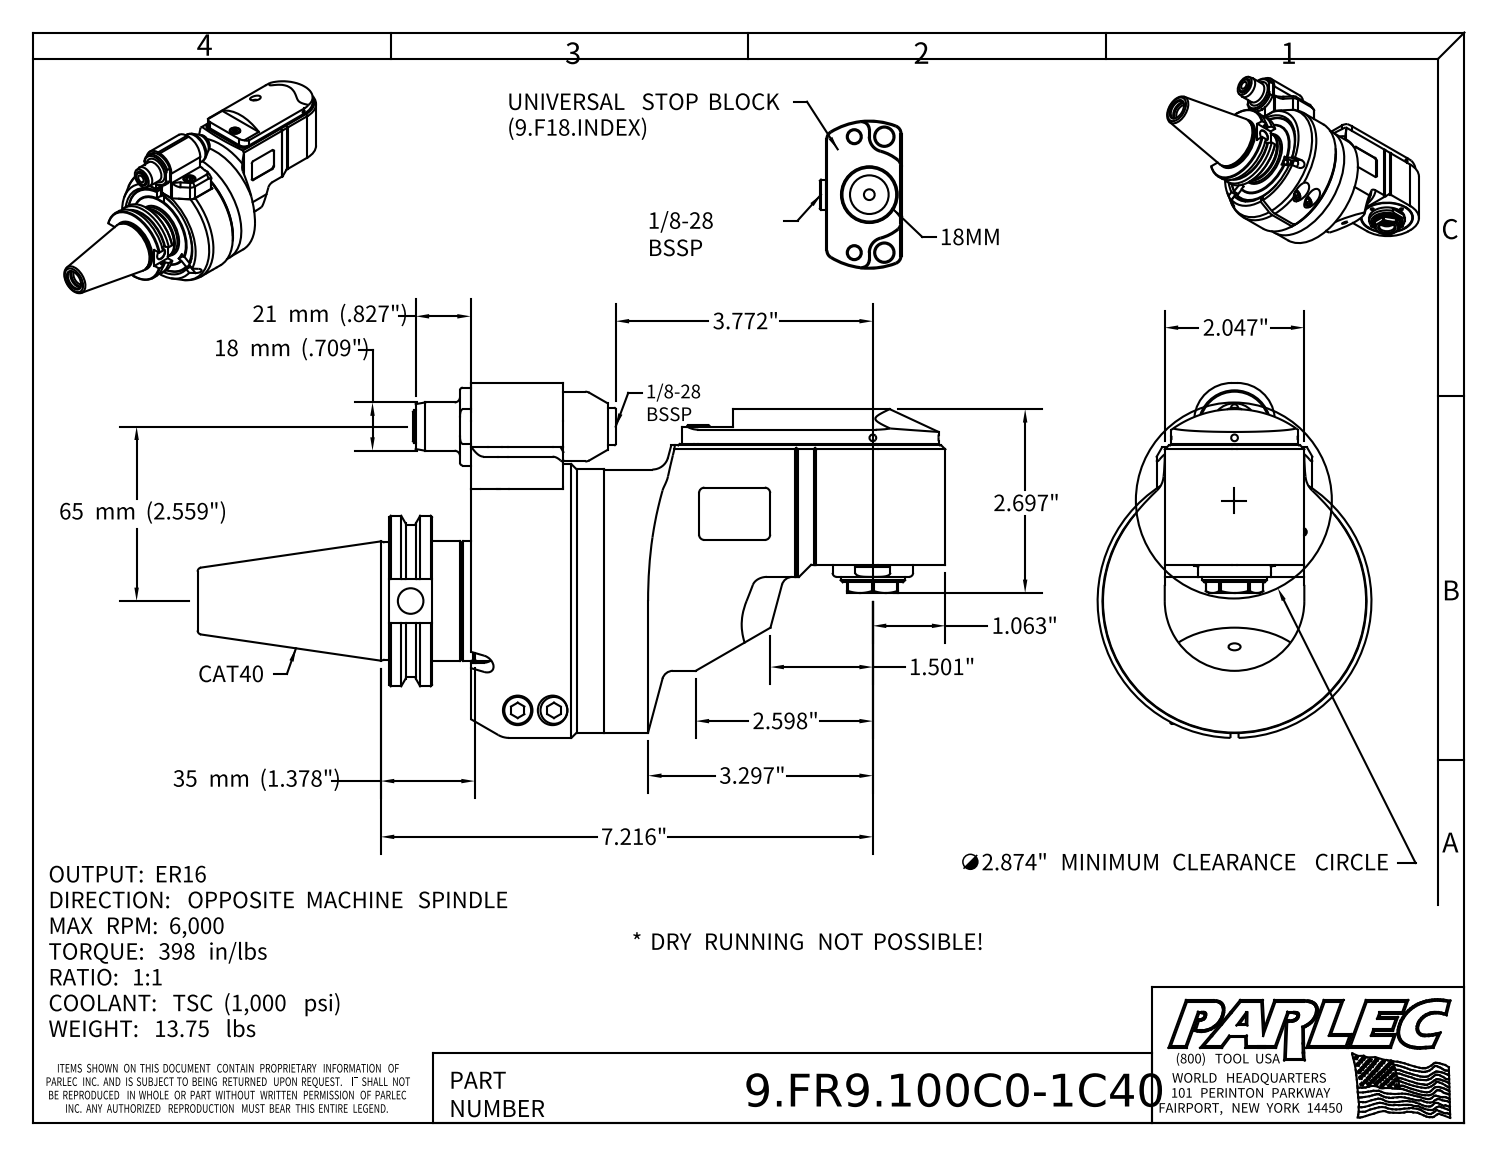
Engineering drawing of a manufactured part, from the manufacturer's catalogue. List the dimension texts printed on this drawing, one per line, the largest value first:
65 mm (2.559")
35 mm (1.378")
21 mm (.827")
18 mm (.709")
7.216"
3.772"
3.297"
∅2.874" MINIMUM CLEARANCE CIRCLE
2.697"
2.598"
2.047"
1.501"
1.063"
